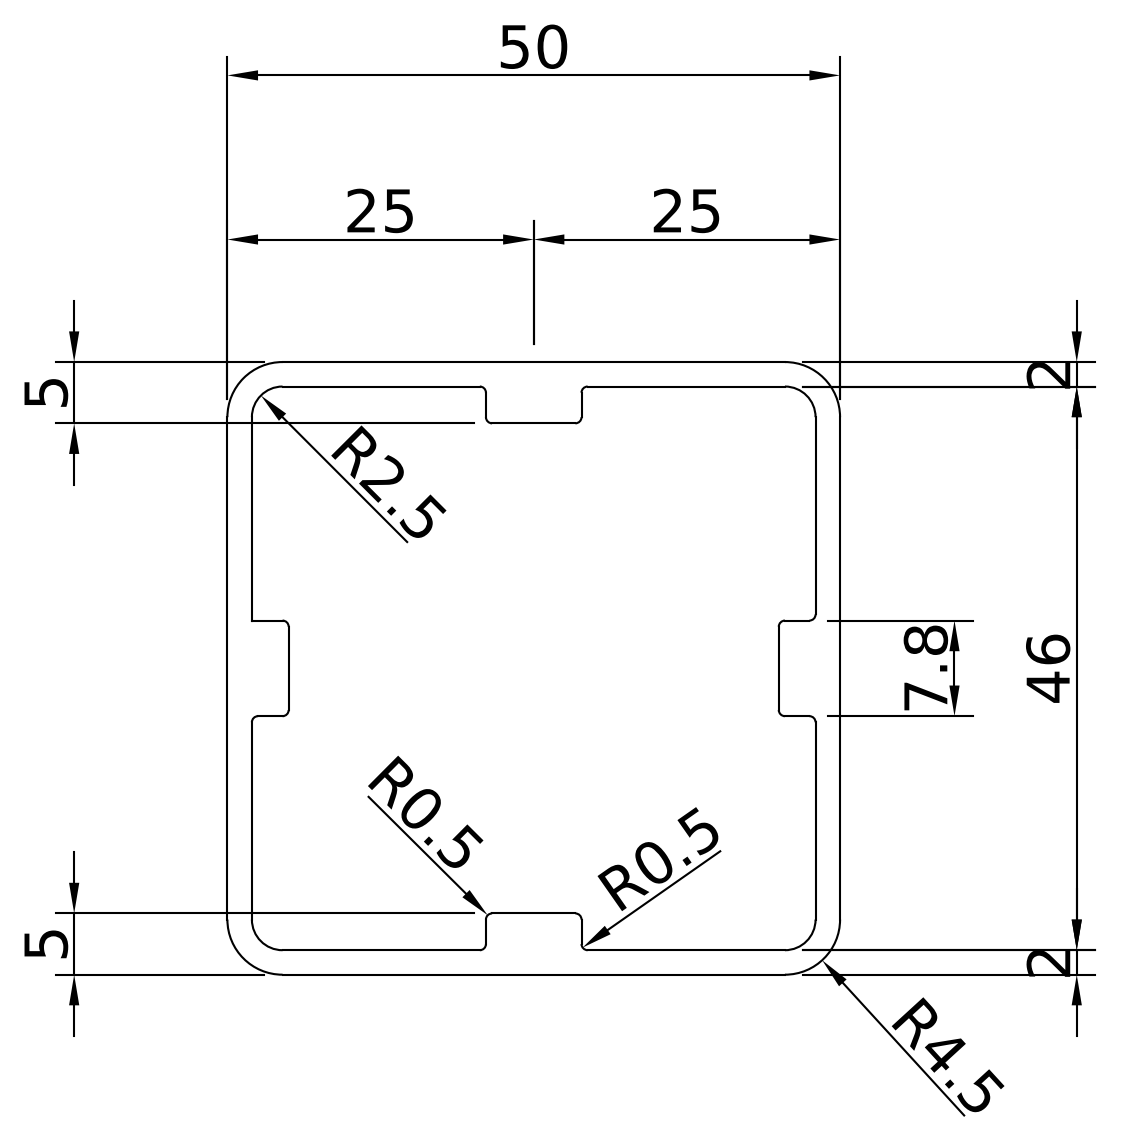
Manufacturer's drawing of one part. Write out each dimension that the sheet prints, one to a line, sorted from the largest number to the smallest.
50
46
25
25
7.8
5
5
R4.5
R2.5
2
2
R0.5
R0.5
